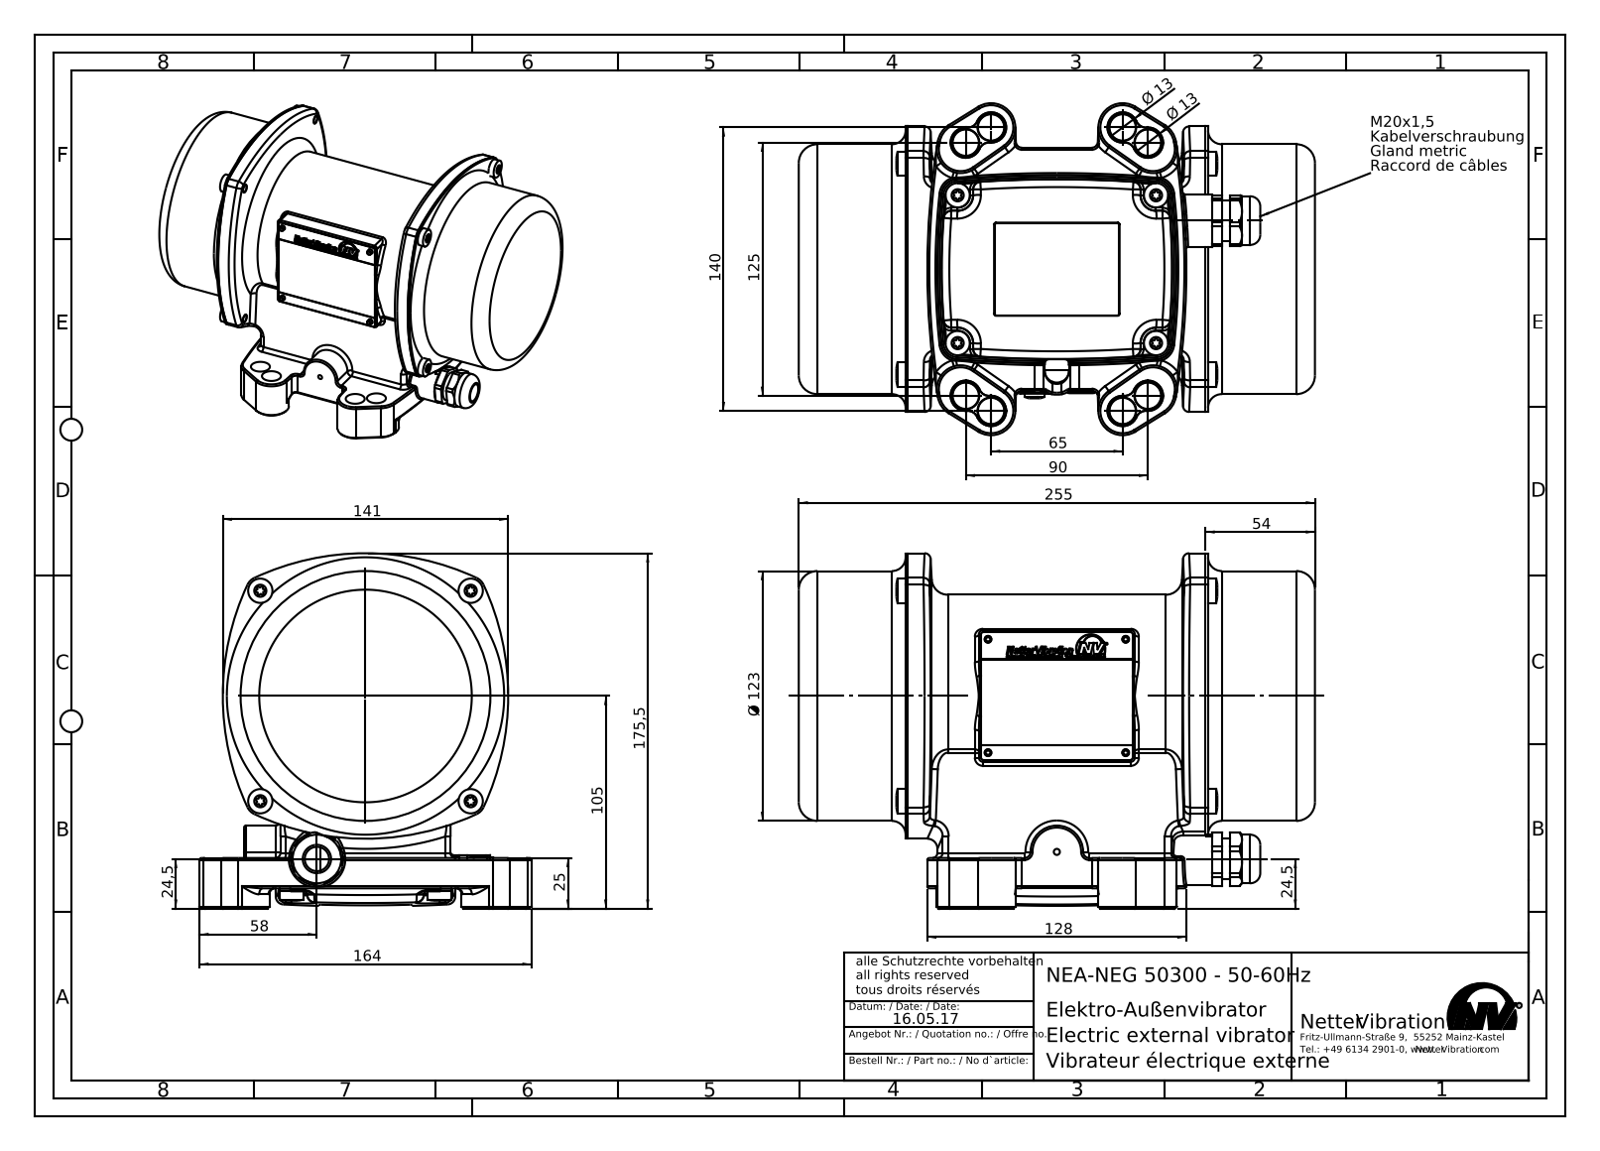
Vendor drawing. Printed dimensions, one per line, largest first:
255
175,5
164
141
140
128
125
Ø 123
105
90
65
58
54
25
24,5
24,5
Ø 13
Ø 13
